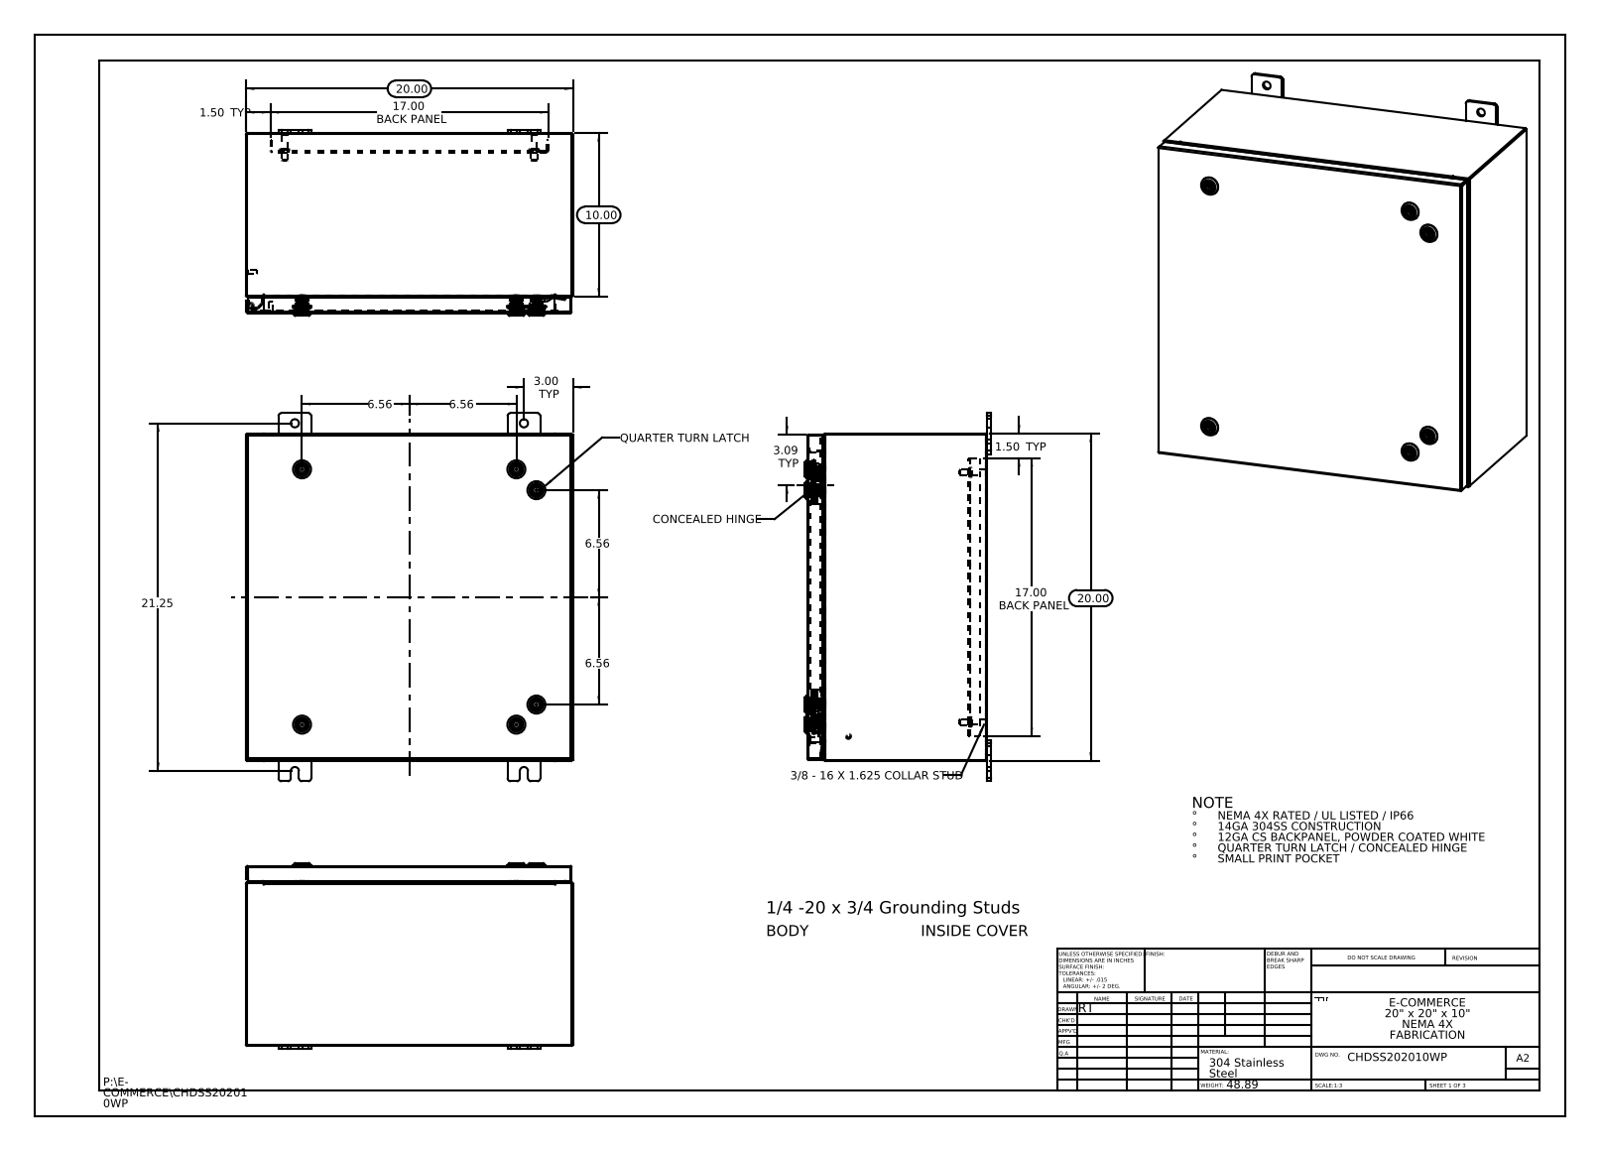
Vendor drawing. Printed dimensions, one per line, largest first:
21.25
20.00
20.00
17.00 BACK PANEL
17.00 BACK PANEL
10.00
6.56
6.56
6.56
6.56
3.09 TYP
3.00 TYP
1.50 TYP
1.50 TYP
